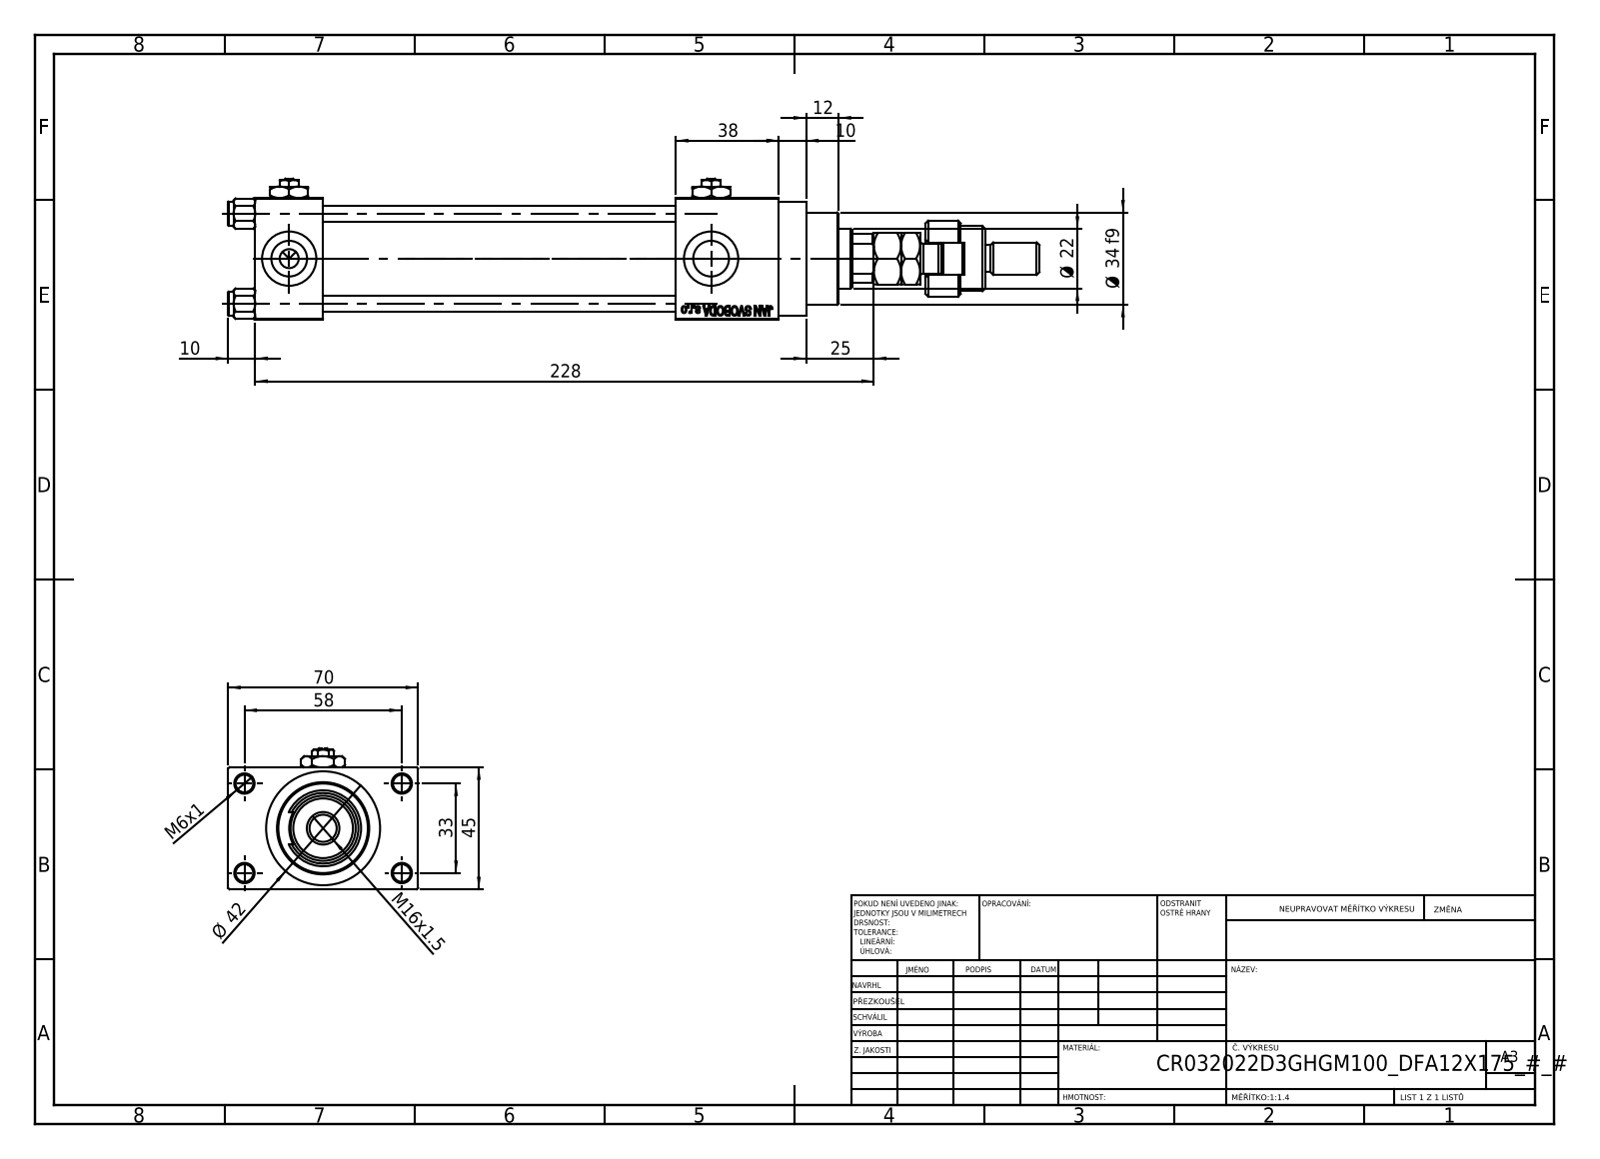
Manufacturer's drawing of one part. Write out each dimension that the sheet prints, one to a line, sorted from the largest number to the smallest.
228
70
58
45
Ø 42
38
Ø 34 f9
33
25
Ø 22
M16x1.5
12
10
10
M6x1
